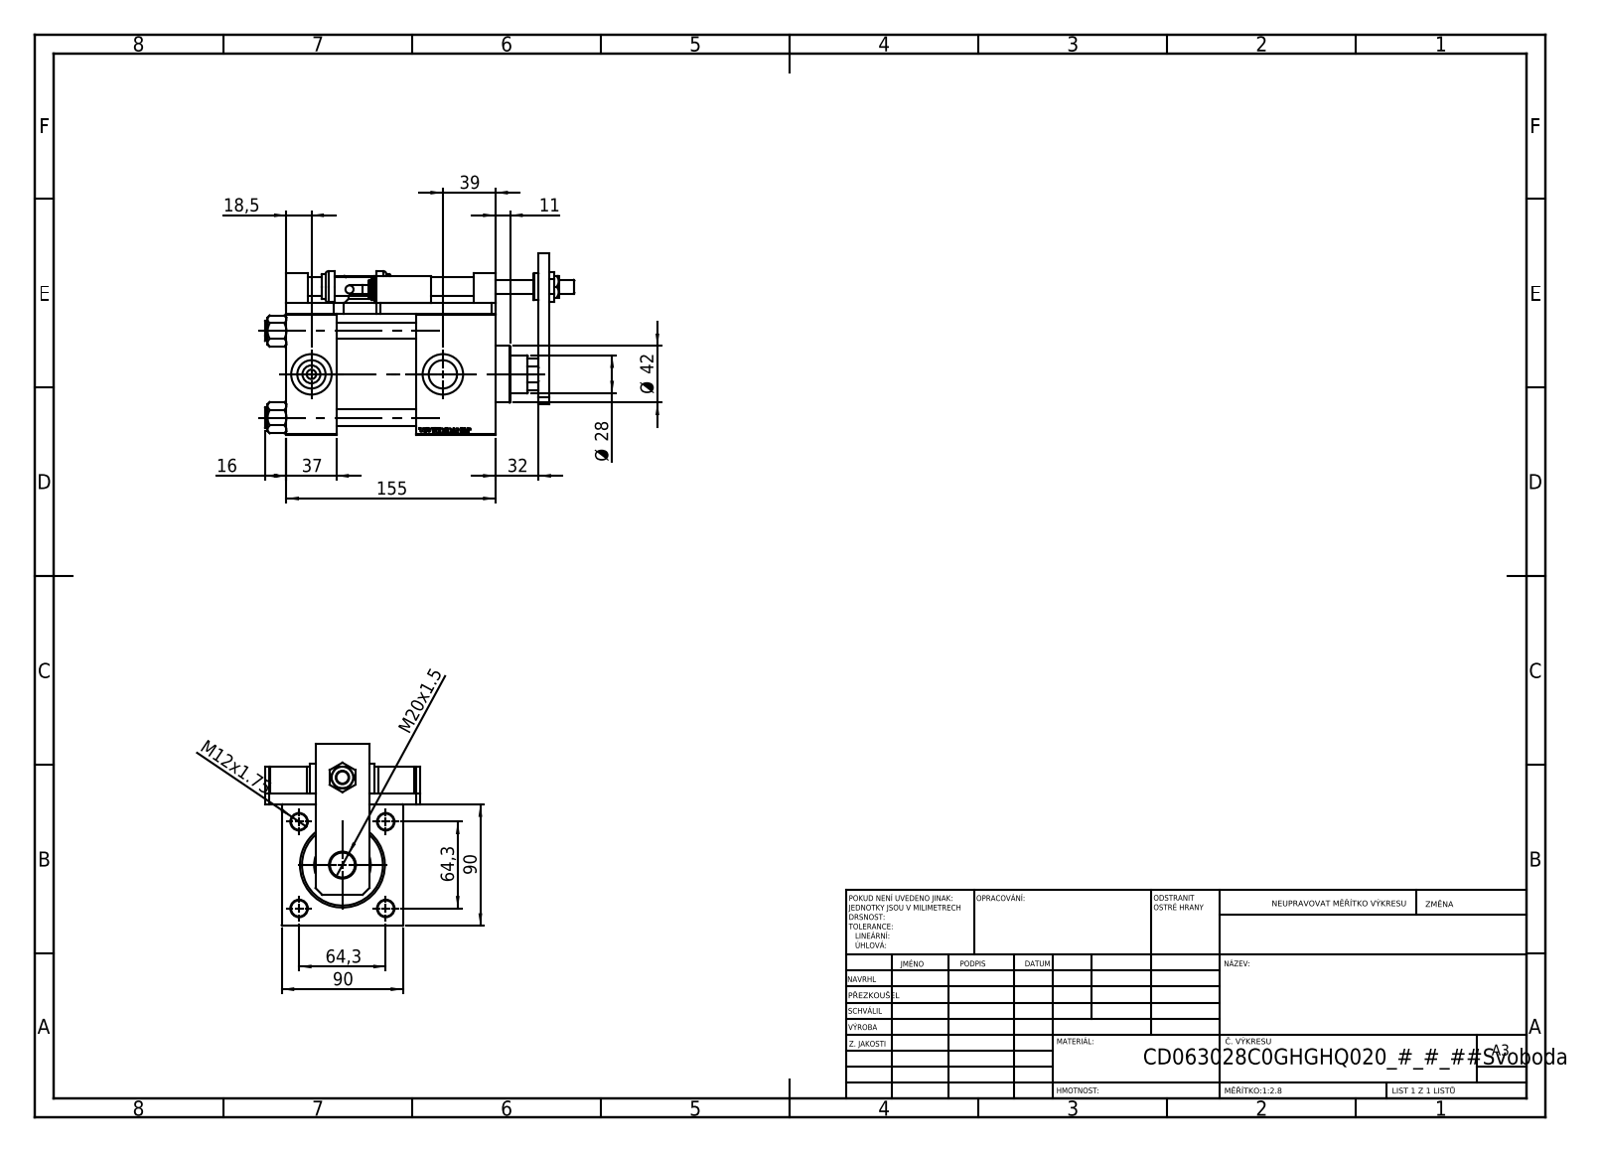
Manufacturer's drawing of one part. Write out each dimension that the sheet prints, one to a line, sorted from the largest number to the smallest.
155
90
90
64,3
64,3
Ø 42
39
37
32
Ø 28
M20x1.5
18,5
16
M12x1.75
11
